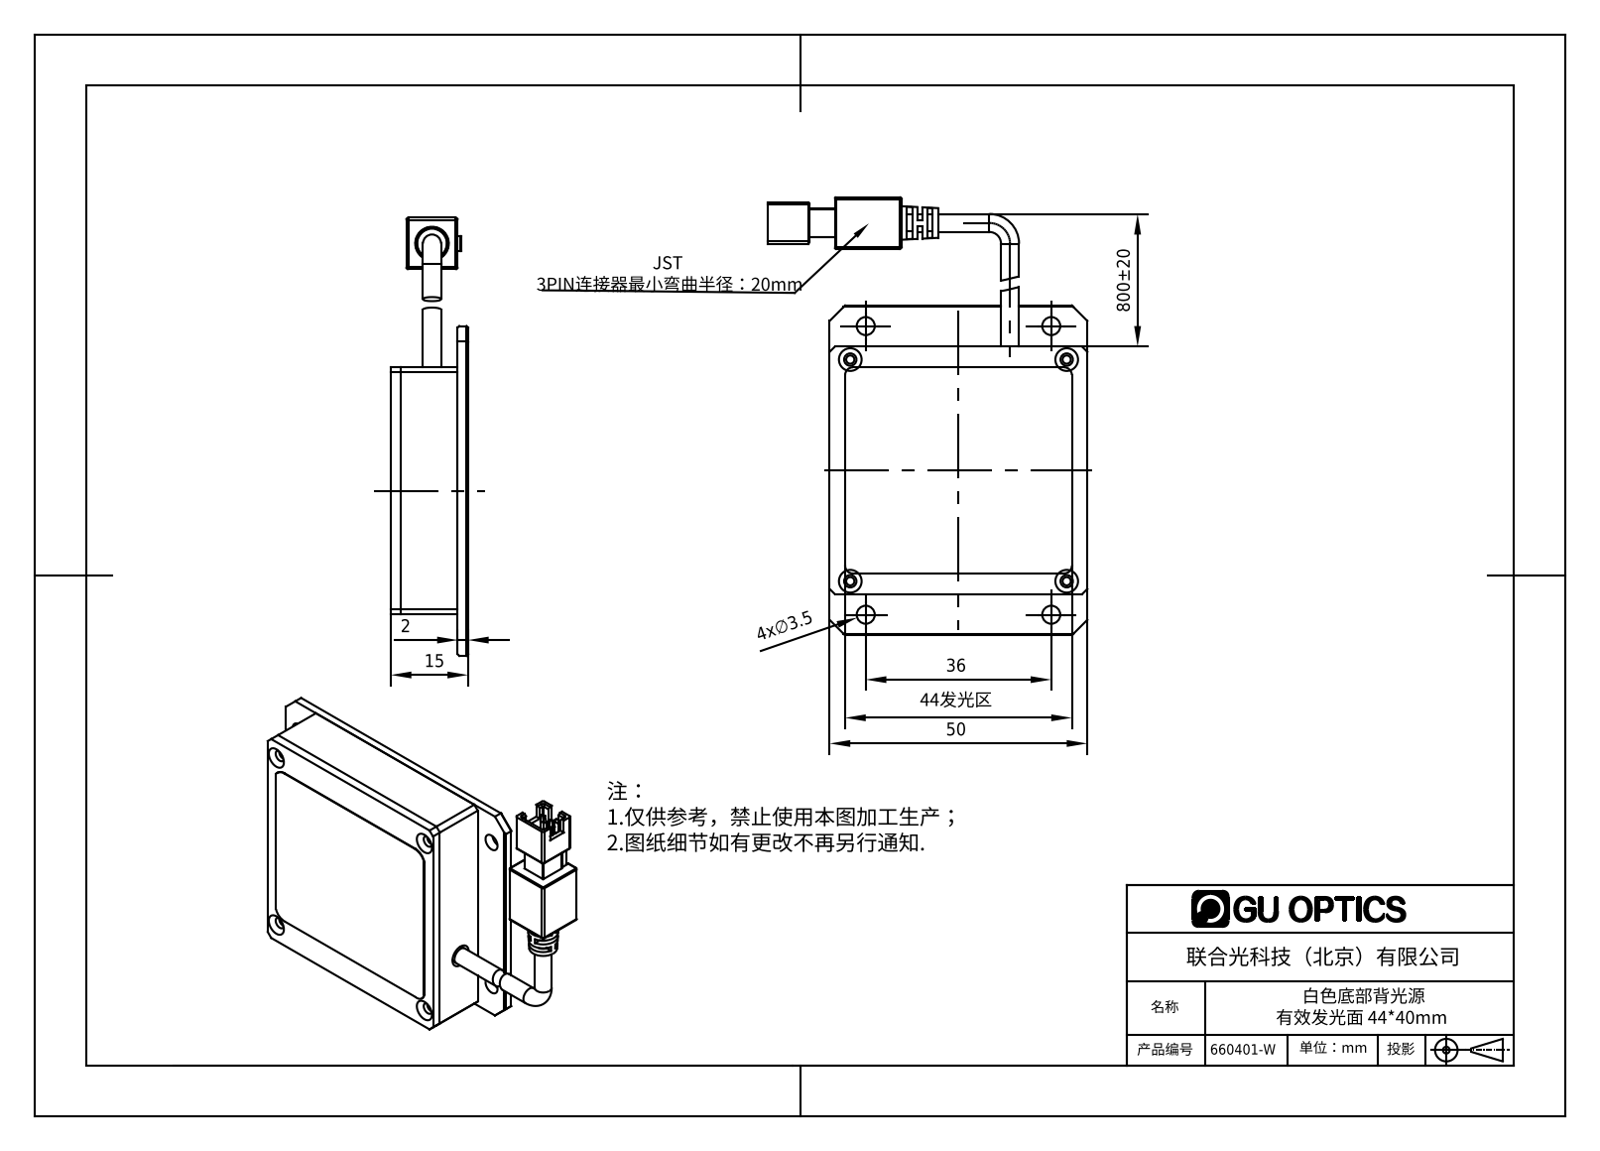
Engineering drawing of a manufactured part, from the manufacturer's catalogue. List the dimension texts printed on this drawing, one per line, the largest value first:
800±20
50
44发光区
36
15
4x∅3.5
2
